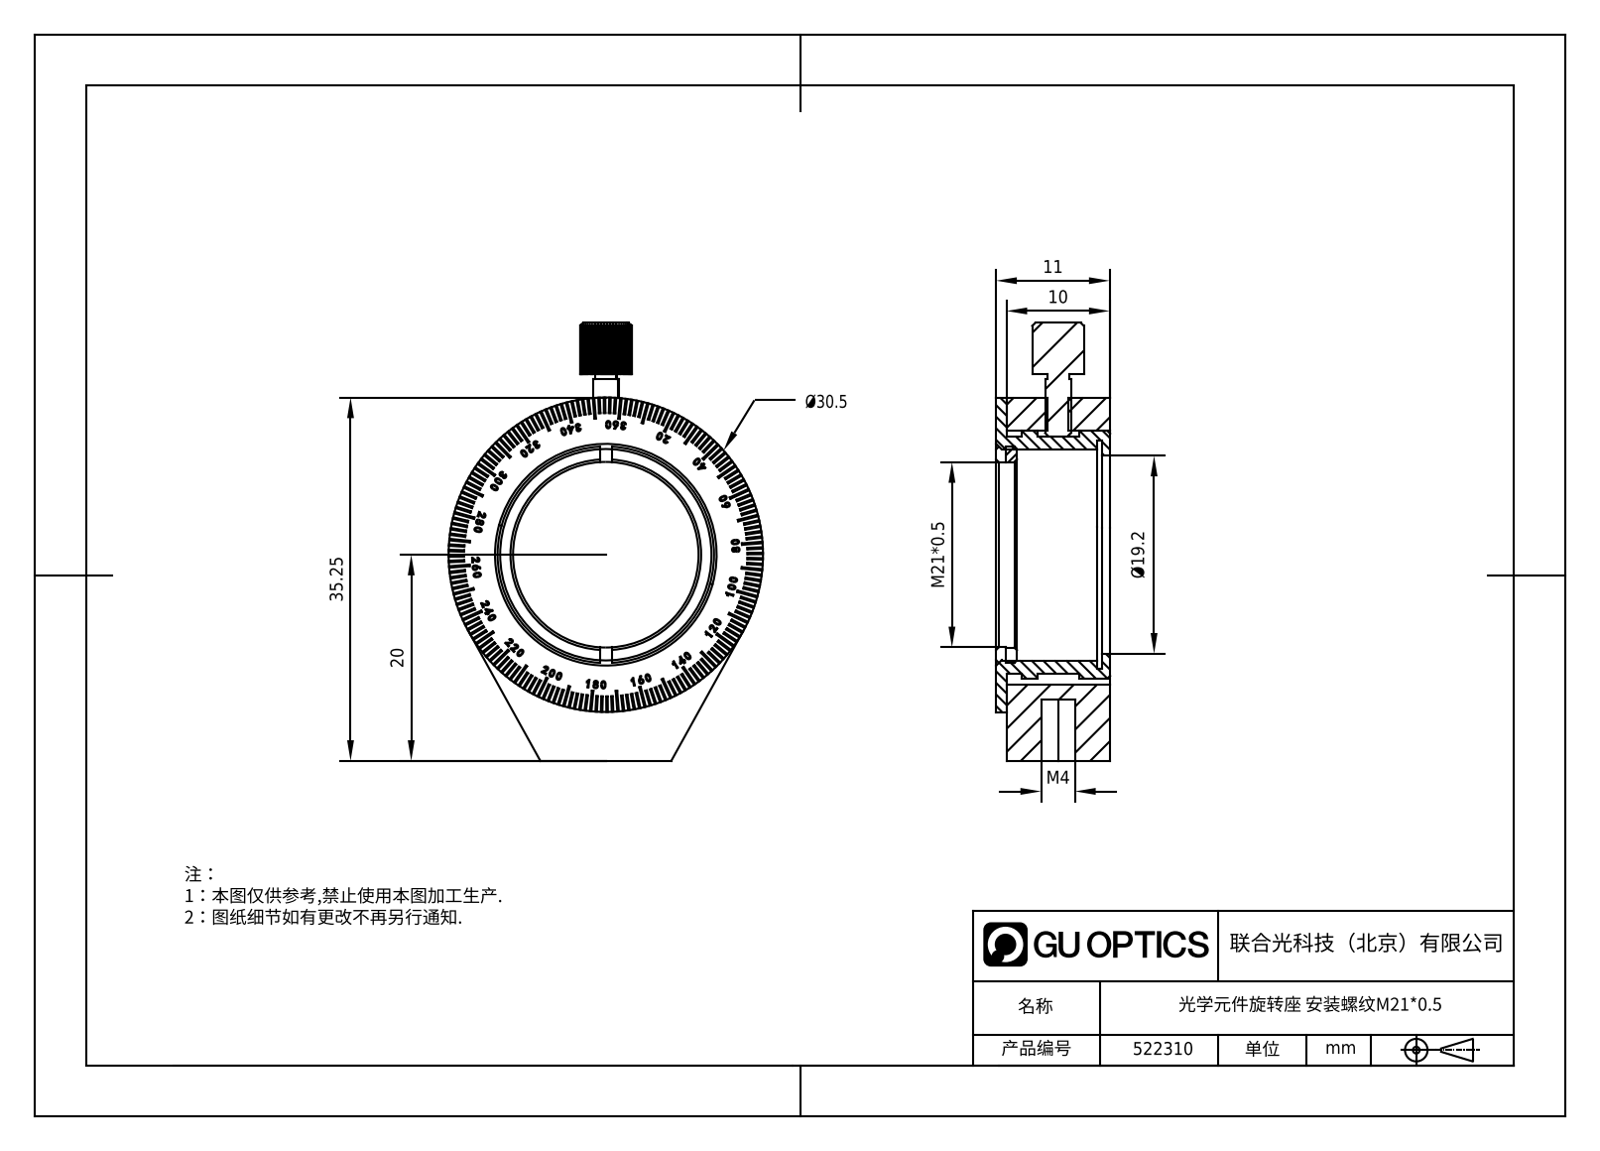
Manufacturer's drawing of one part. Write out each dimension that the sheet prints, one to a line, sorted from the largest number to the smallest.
35.25
M21*0.5
20
Ø19.2
11
10
M4
